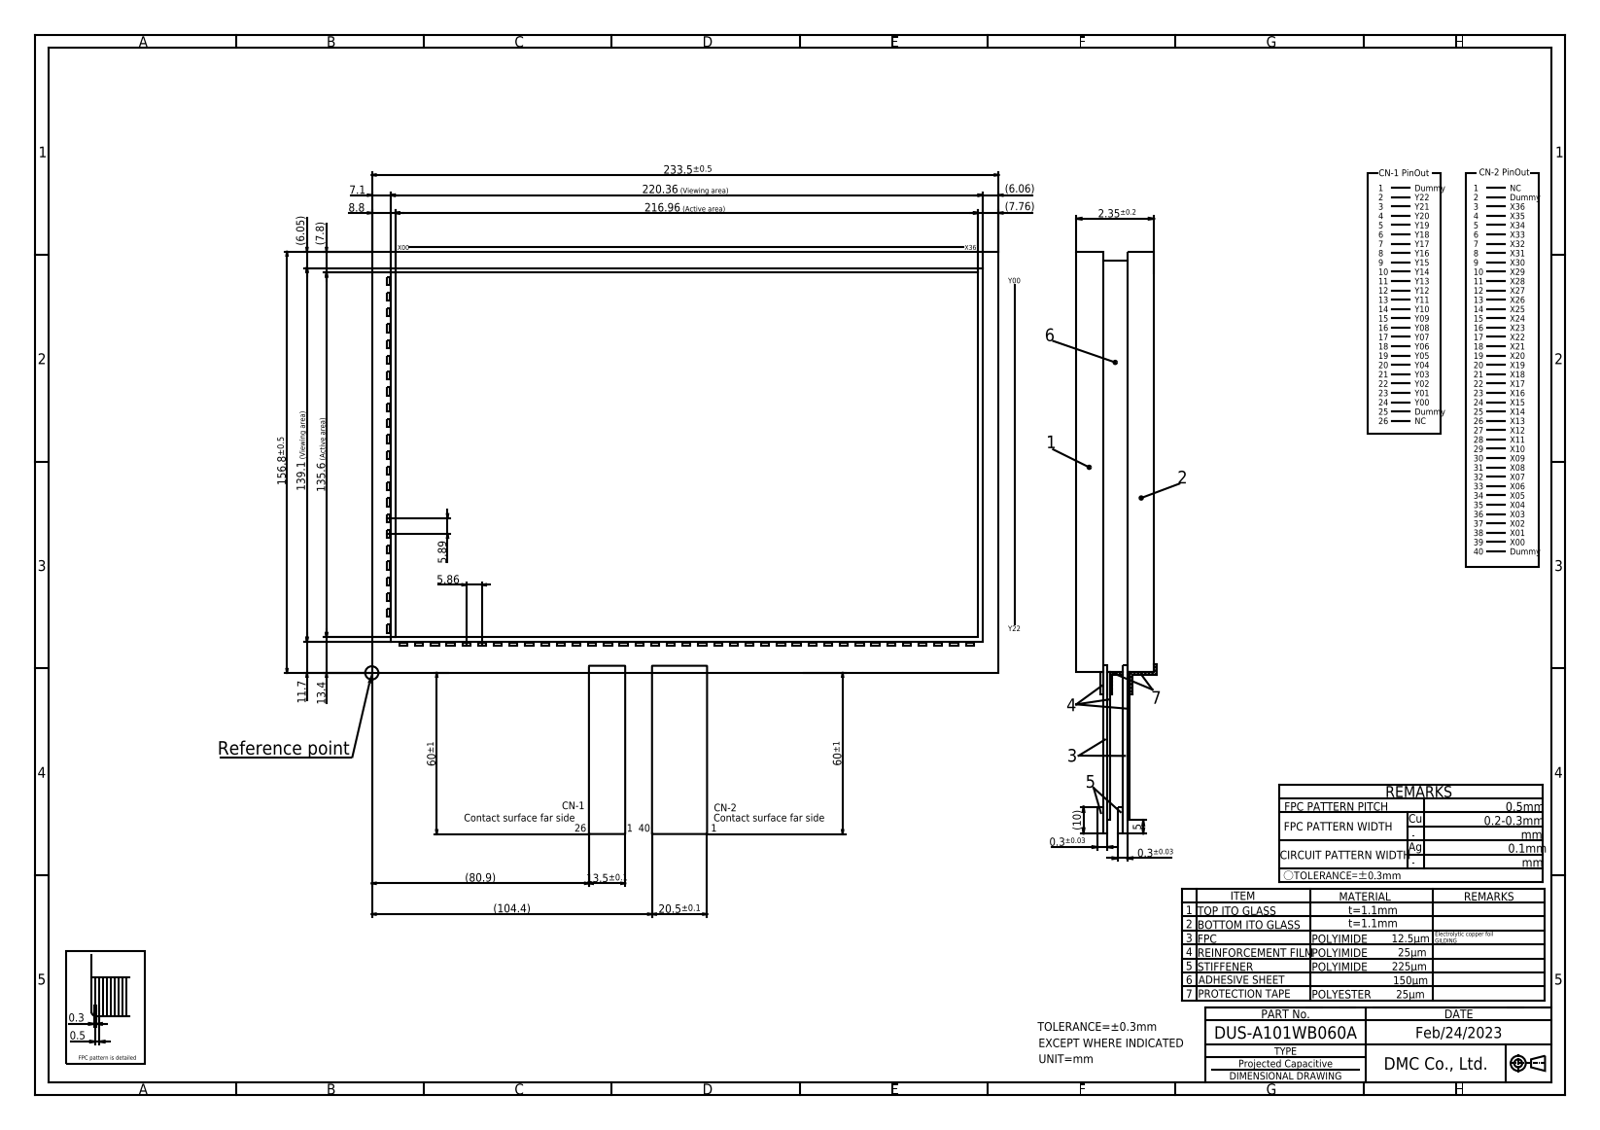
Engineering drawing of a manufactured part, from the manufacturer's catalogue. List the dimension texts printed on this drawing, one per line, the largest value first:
233.5±0.5
220.36 (Viewing area)
216.96 (Active area)
156.8±0.5
139.1 (Viewing area)
135.6 (Active area)
(104.4)
(80.9)
60±1
60±1
20.5±0.1
13.5±0.1
13.4
11.7
(10)
8.8
(7.8)
(7.76)
7.1
(6.06)
(6.05)
5.89
5.86
5
2.35±0.2
0.5
0.3
0.3±0.03
0.3±0.03
